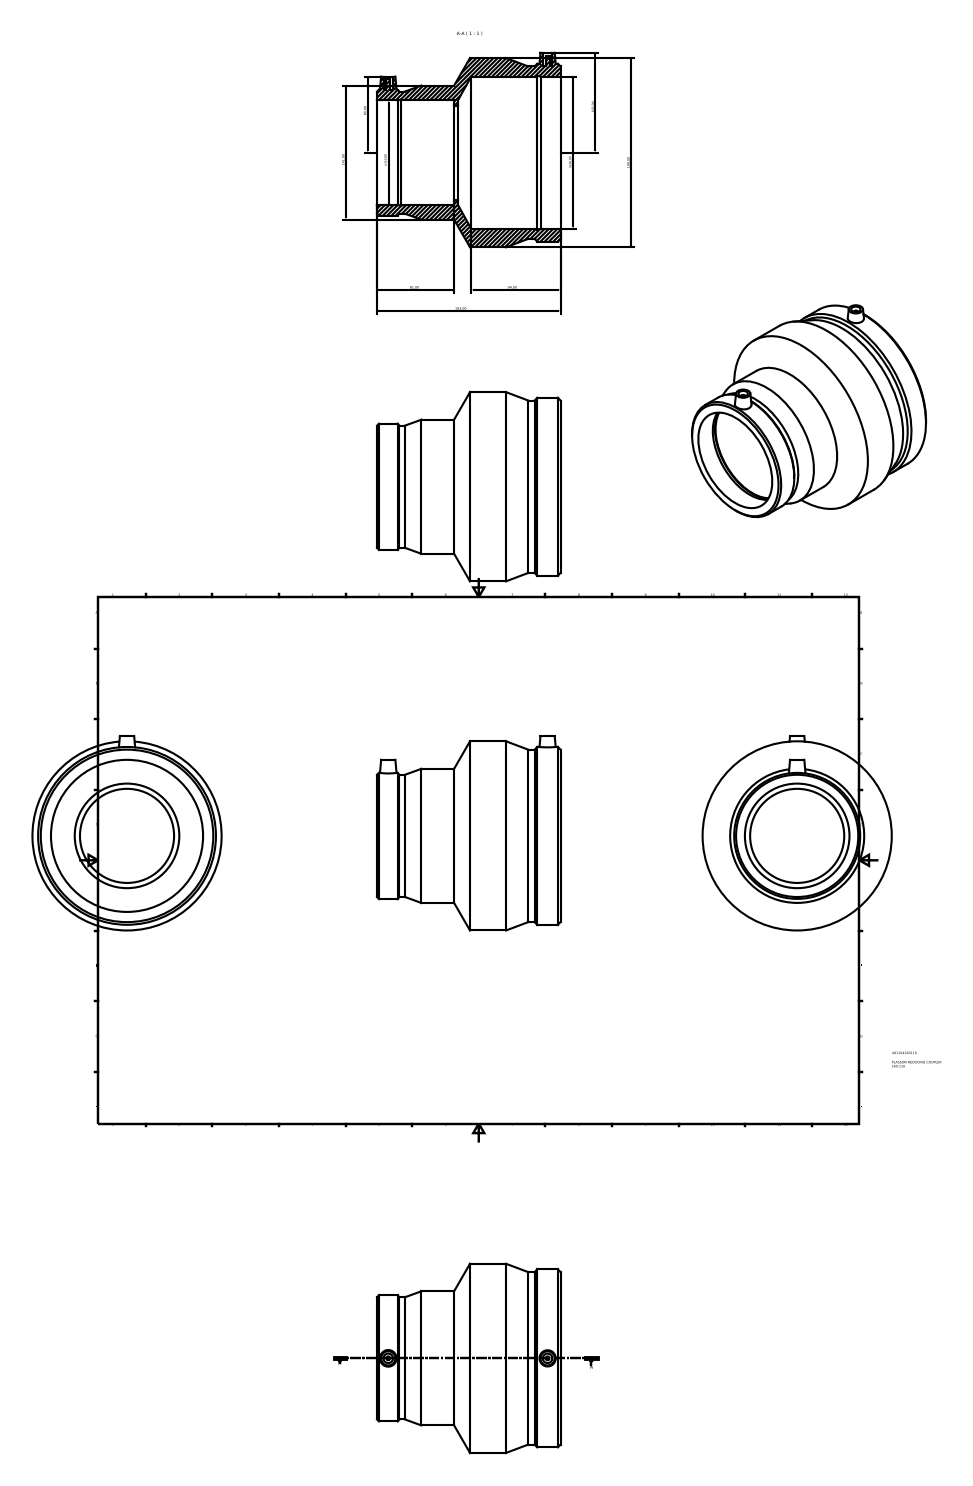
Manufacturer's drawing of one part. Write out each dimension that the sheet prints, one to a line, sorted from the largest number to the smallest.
199,00
193,00
n160,00
141,00
n110,00
105,00
94,00
81,00
80,00
